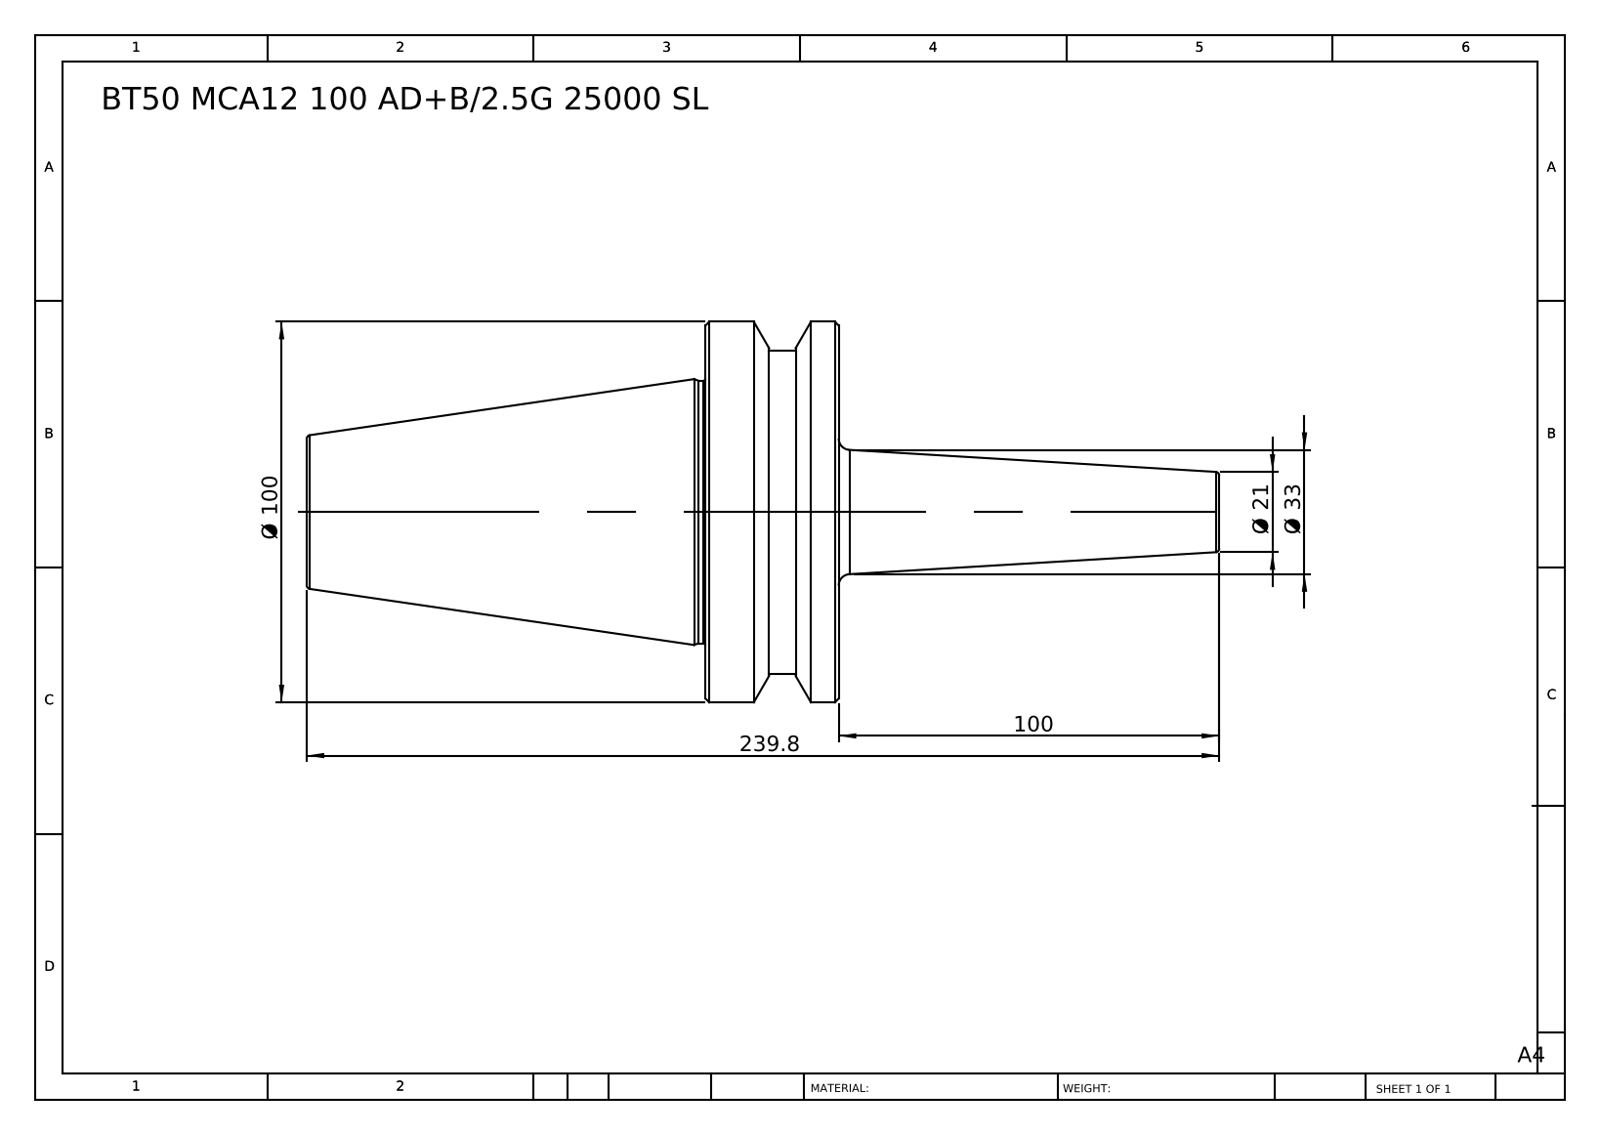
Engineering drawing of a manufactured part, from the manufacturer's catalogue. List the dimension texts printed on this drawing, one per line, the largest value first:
239.8
Ø 100
100
Ø 33
Ø 21
